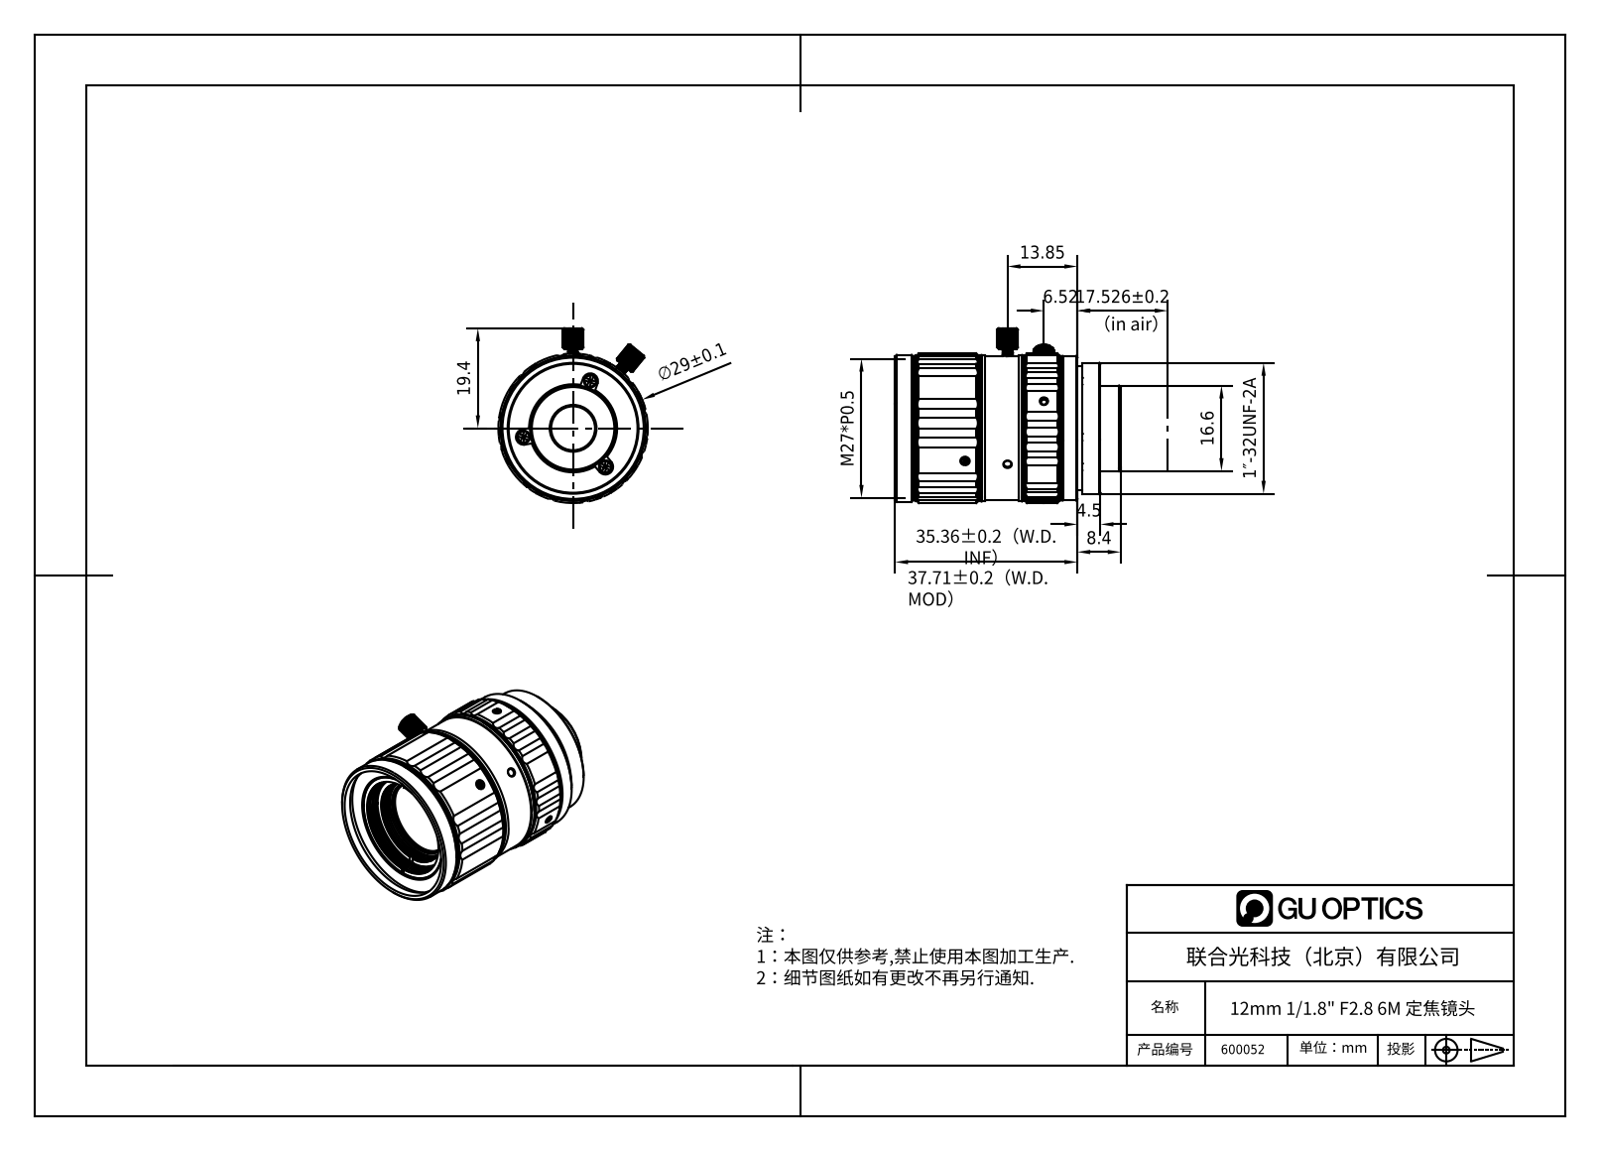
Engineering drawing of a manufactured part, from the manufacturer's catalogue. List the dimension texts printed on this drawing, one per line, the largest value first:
35.36±0.2（W.D. INF）
∅29±0.1
M27*P0.5
19.4
17.526±0.2
16.6
13.85
8.4
6.52
4.5
1″-32UNF-2A
